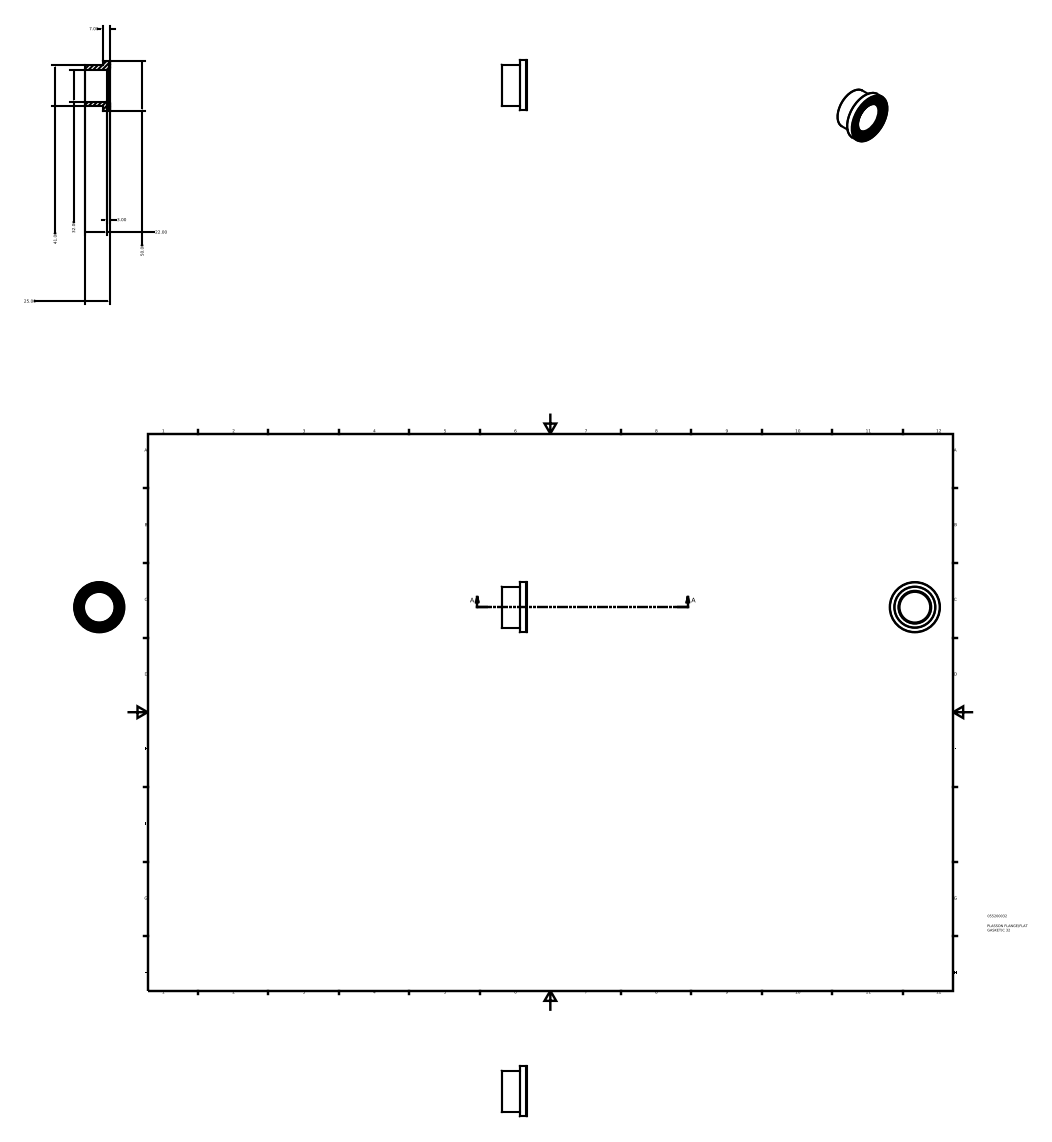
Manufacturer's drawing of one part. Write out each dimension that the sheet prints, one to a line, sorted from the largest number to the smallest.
50.00
41.00
32.00
25.00
22.00
7.00
3.00
